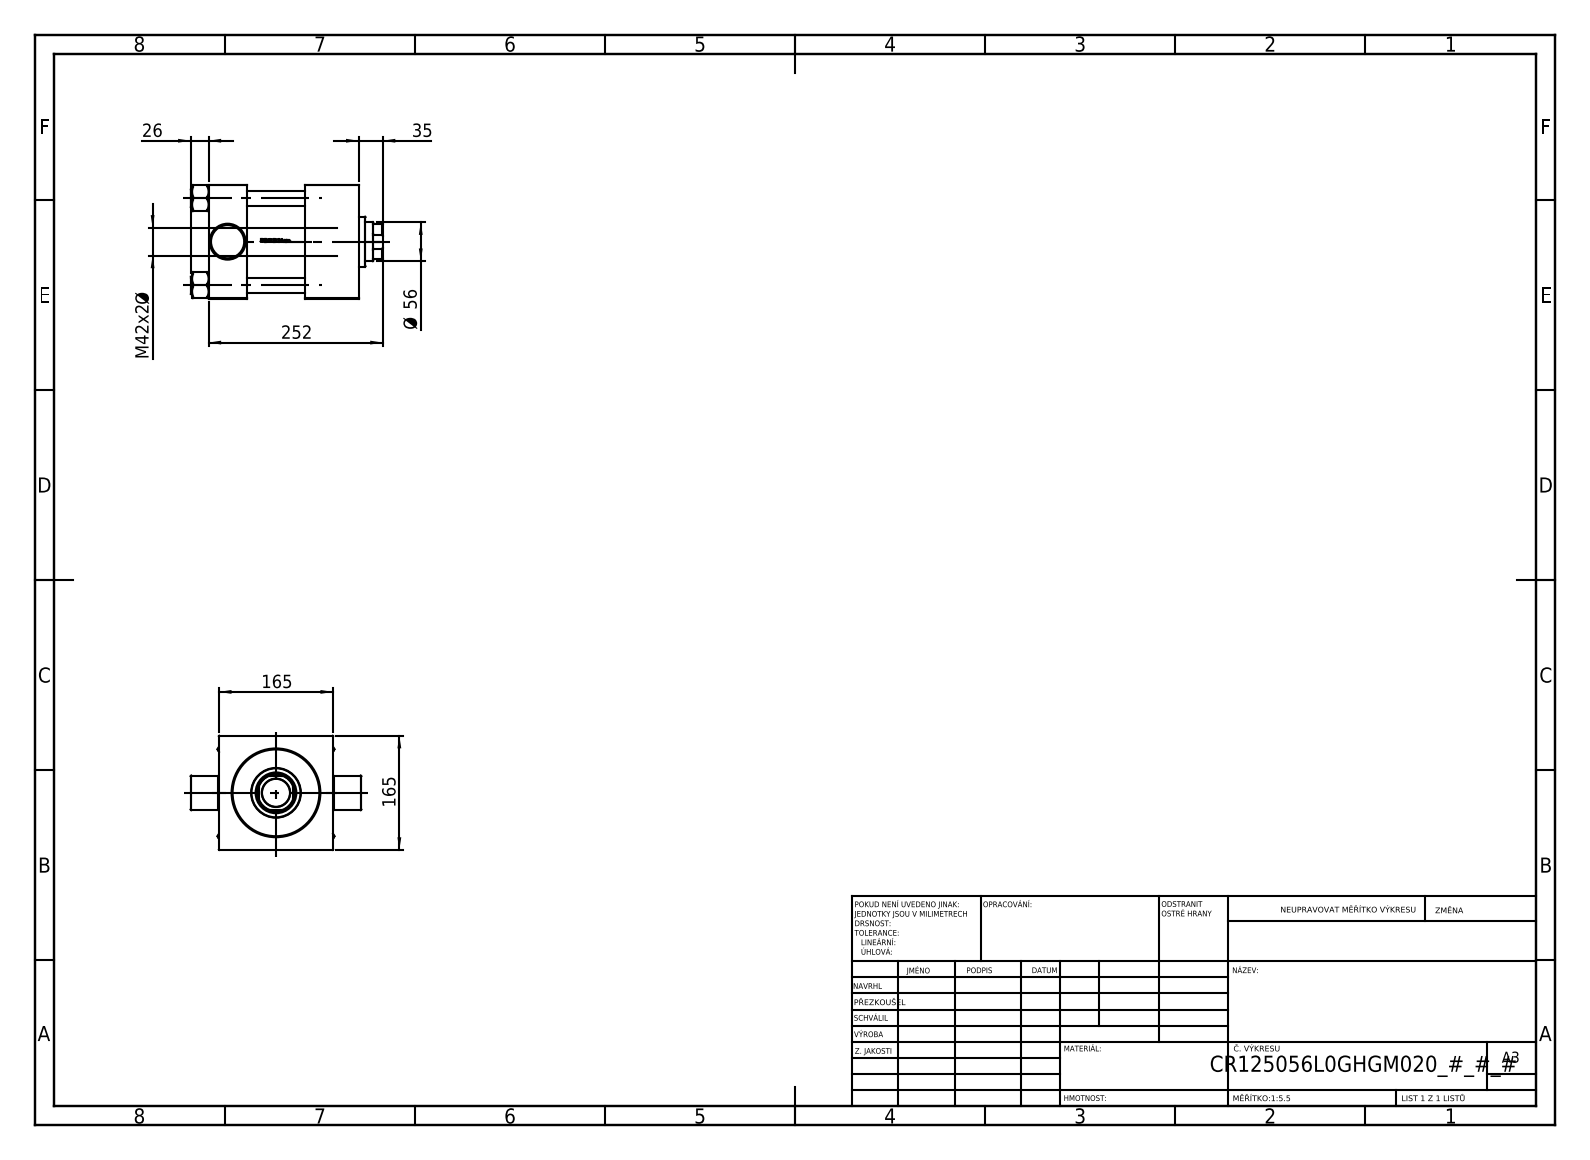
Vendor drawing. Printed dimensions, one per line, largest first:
252
165
165
Ø 56
M42x2 Ø
35
26
